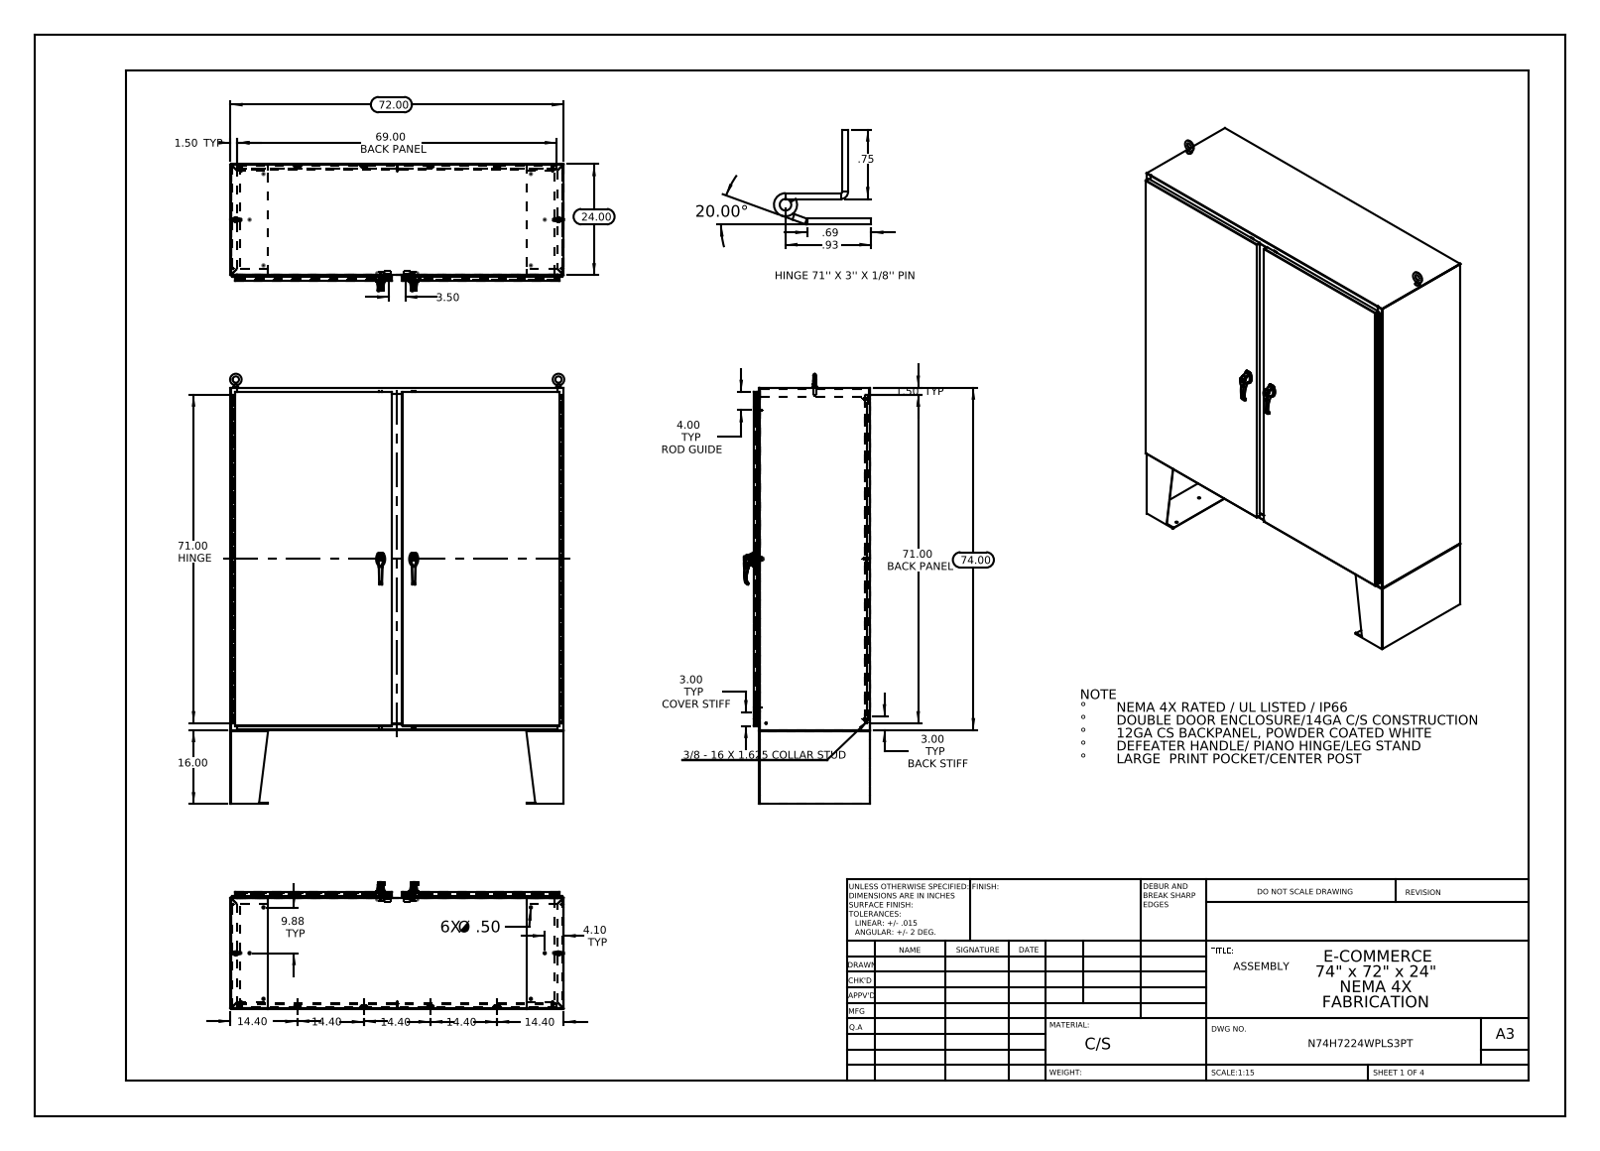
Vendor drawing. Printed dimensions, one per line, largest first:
74.00
72.00
71.00 HINGE
71.00 BACK PANEL
69.00 BACK PANEL
24.00
20.00°
16.00
14.40
14.40
14.40
14.40
14.40
9.88 TYP
4.10 TYP
4.00 TYP ROD GUIDE
3.50
3.00 TYP BACK STIFF
3.00 TYP COVER STIFF
1.50 TYP
1.50 TYP
.93
.75
.69
6X Ø .50
